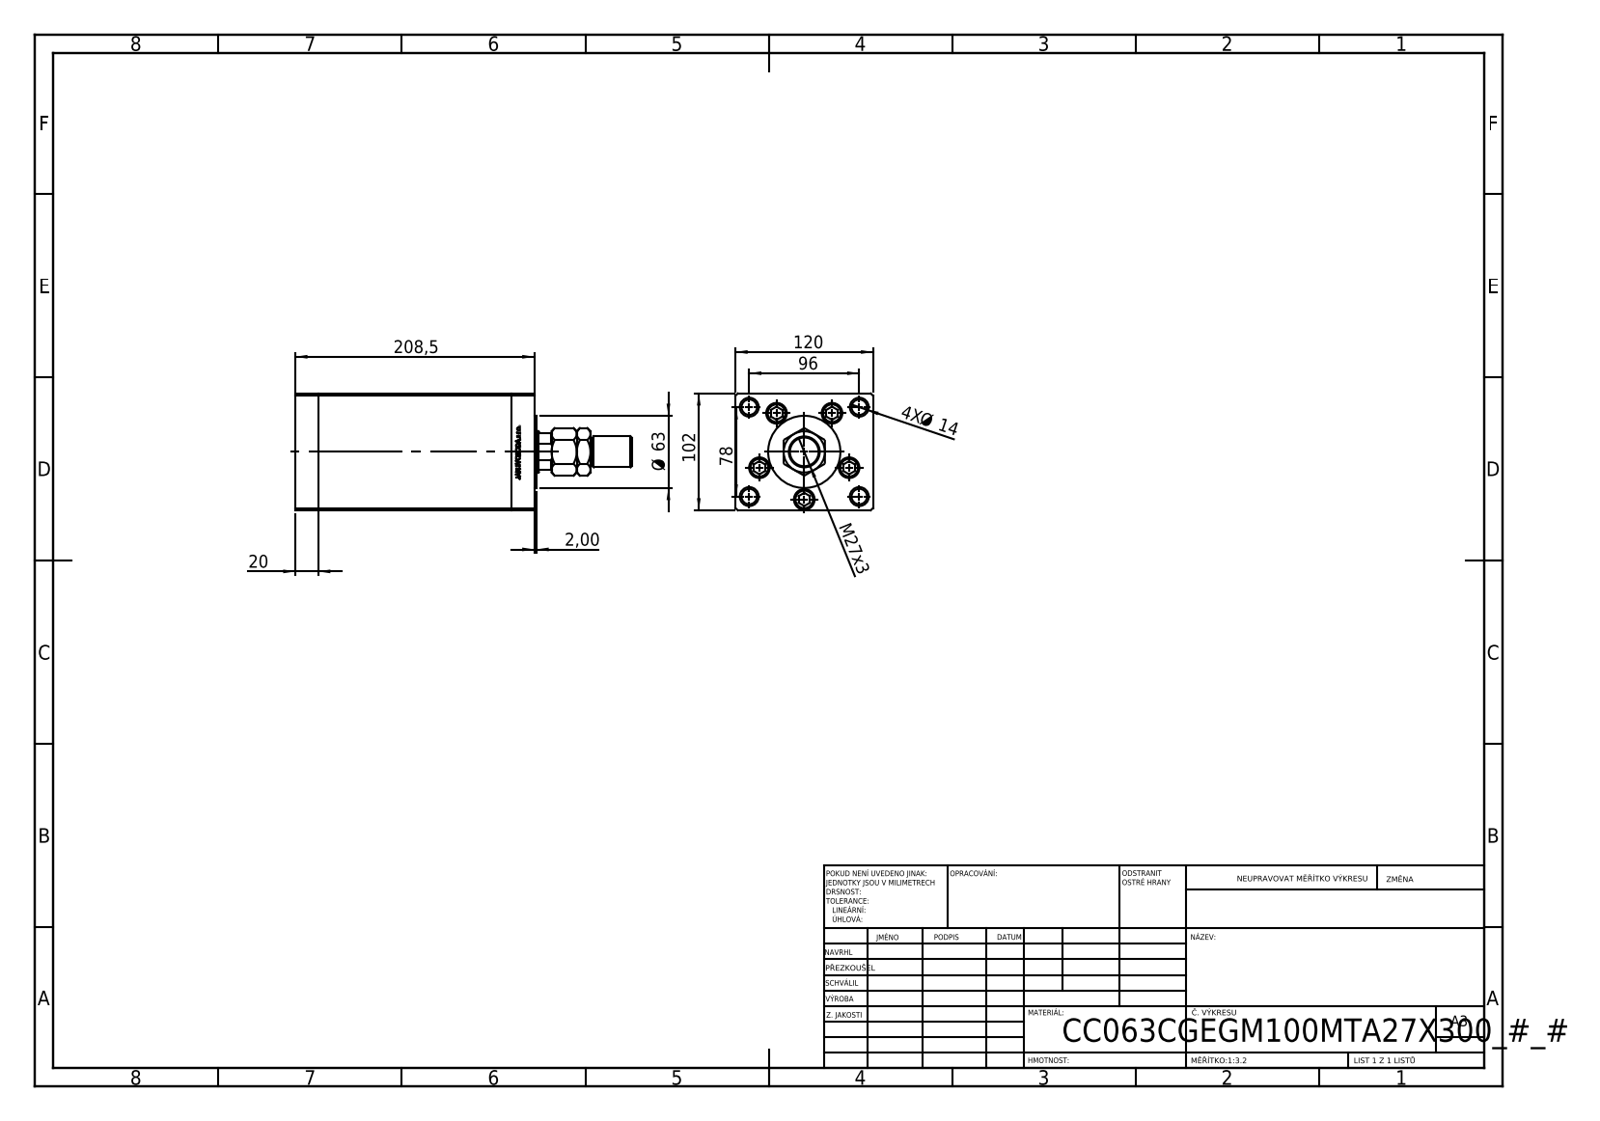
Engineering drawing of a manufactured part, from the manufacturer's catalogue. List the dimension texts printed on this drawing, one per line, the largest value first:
208,5
120
102
96
78
Ø 63
M27x3
20
4X Ø 14
2,00
